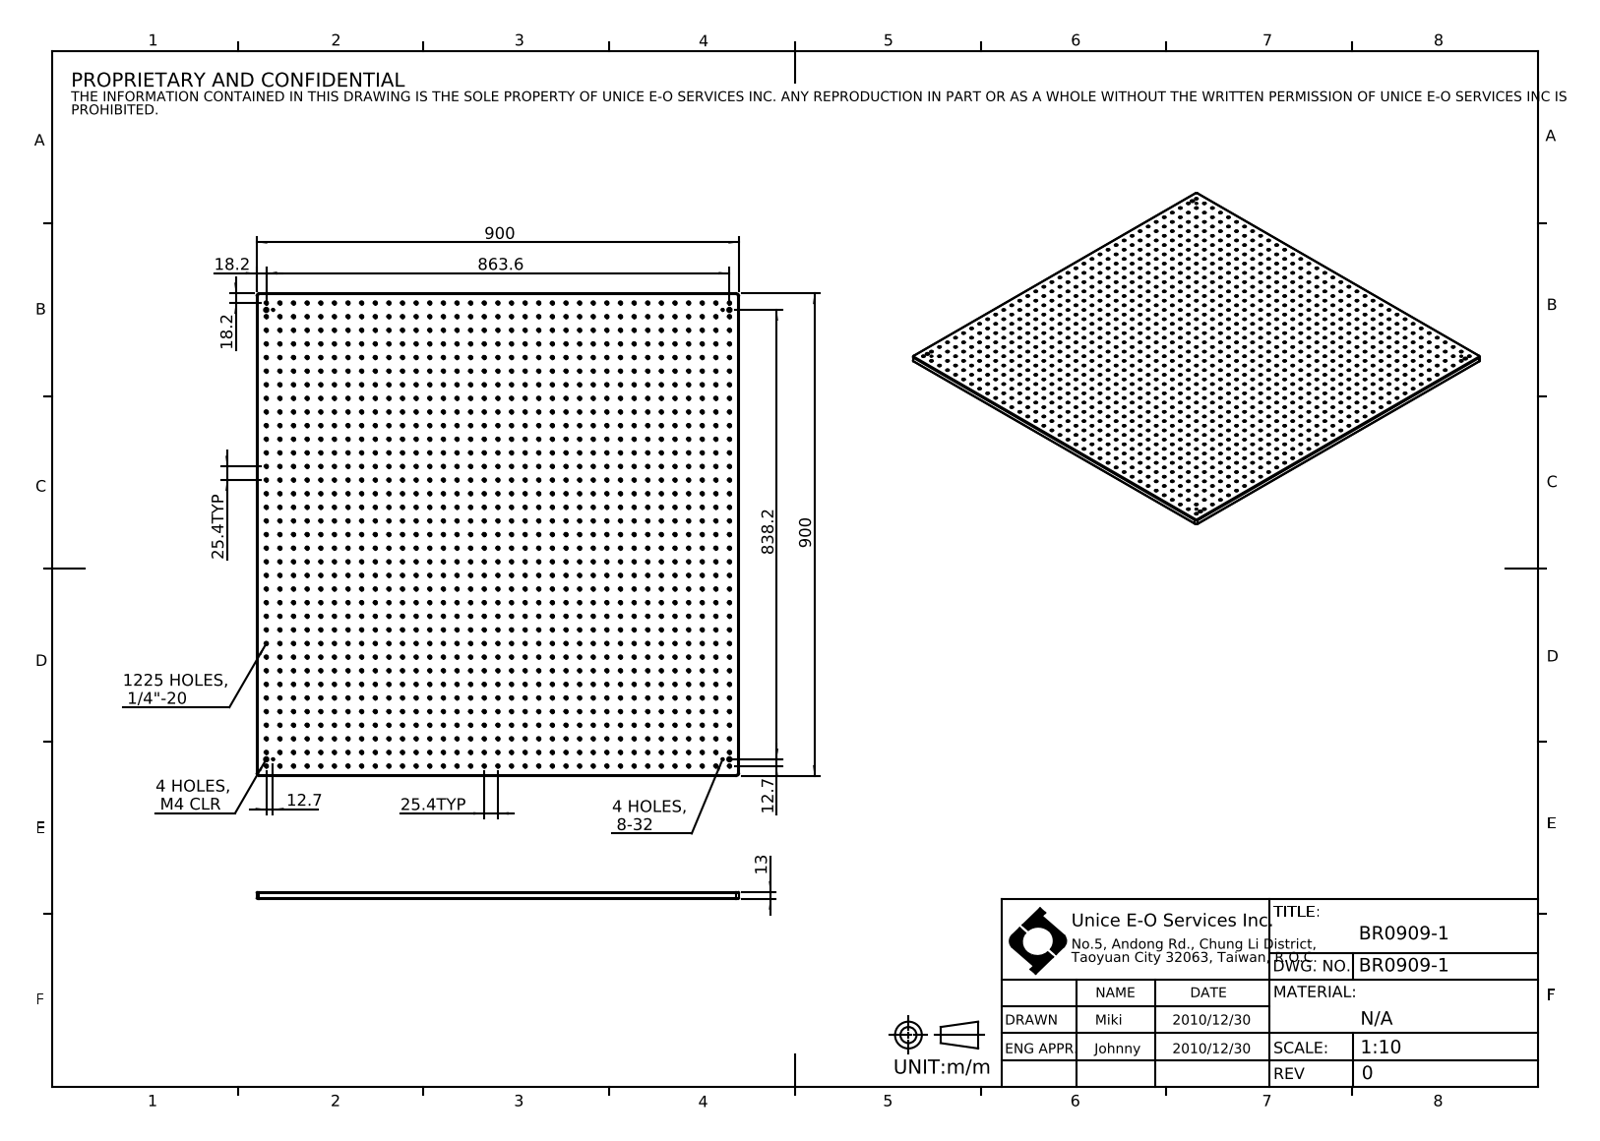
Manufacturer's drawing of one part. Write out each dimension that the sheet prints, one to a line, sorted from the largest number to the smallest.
1225 HOLES, 1/4"-20
900
900
863.6
838.2
25.4 TYP
25.4 TYP
18.2
18.2
13
12.7
12.7
4 HOLES, M4 CLR
4 HOLES, 8-32
